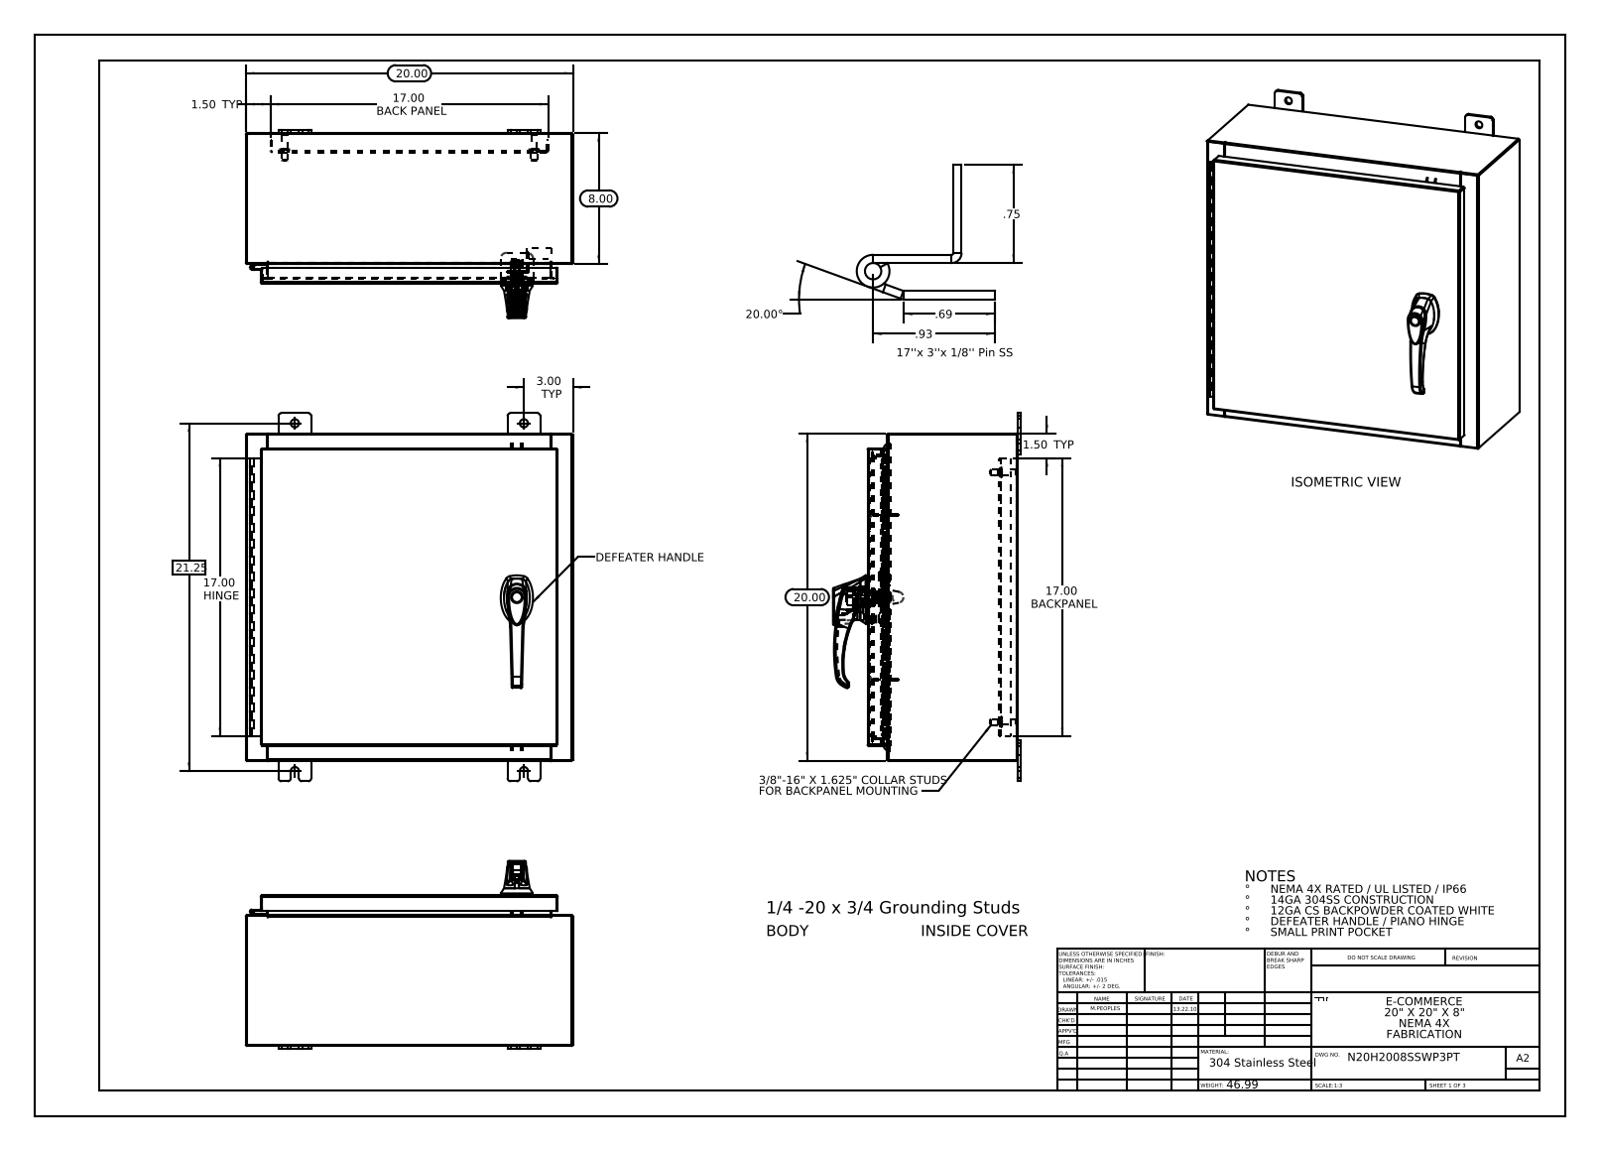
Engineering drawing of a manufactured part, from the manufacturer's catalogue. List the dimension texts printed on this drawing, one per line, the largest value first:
21.25
20.00
20.00
20.00°
17.00 HINGE
17.00 BACK PANEL
17.00 BACKPANEL
8.00
3.00 TYP
1.50 TYP
1.50 TYP
.93
.75
.69
